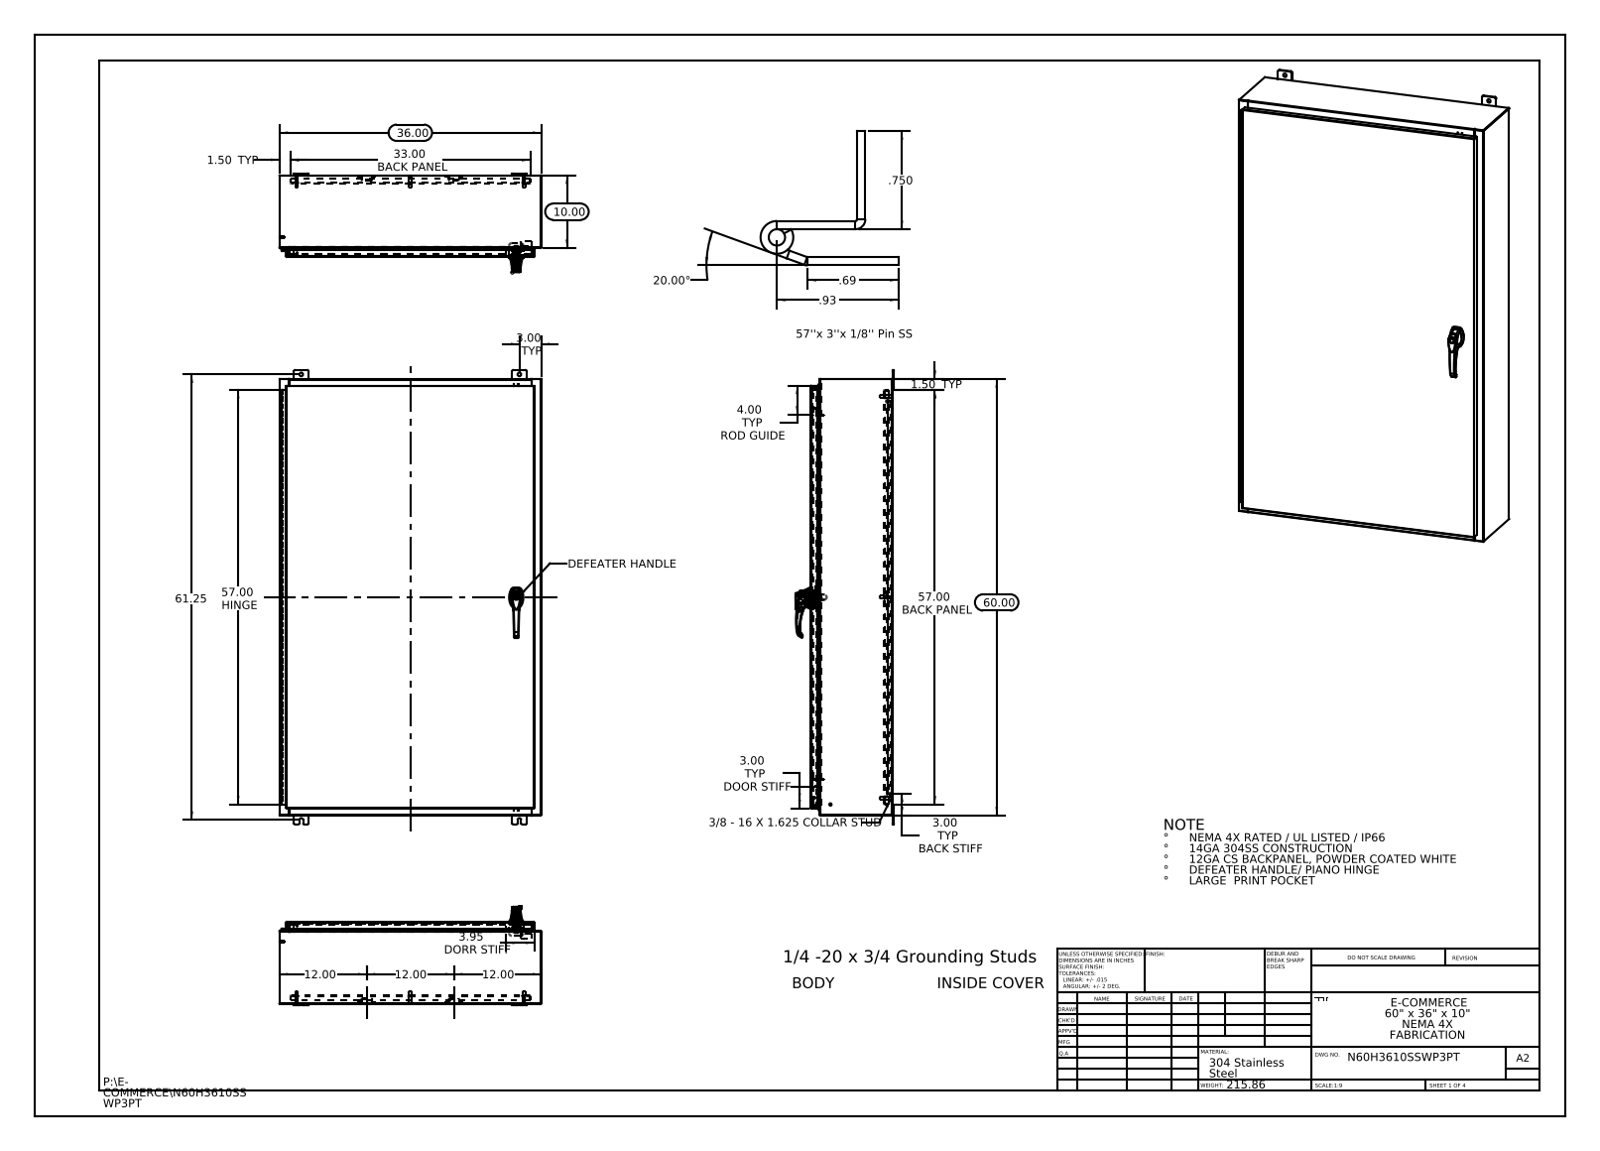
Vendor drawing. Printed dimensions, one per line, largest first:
61.25
60.00
57.00 HINGE
57.00 BACK PANEL
36.00
33.00 BACK PANEL
20.00°
12.00
12.00
12.00
10.00
4.00 TYP ROD GUIDE
3.95 DORR STIFF
3.00 TYP
3.00 TYP DOOR STIFF
3.00 TYP BACK STIFF
1.50 TYP
1.50 TYP
.93
.750
.69
